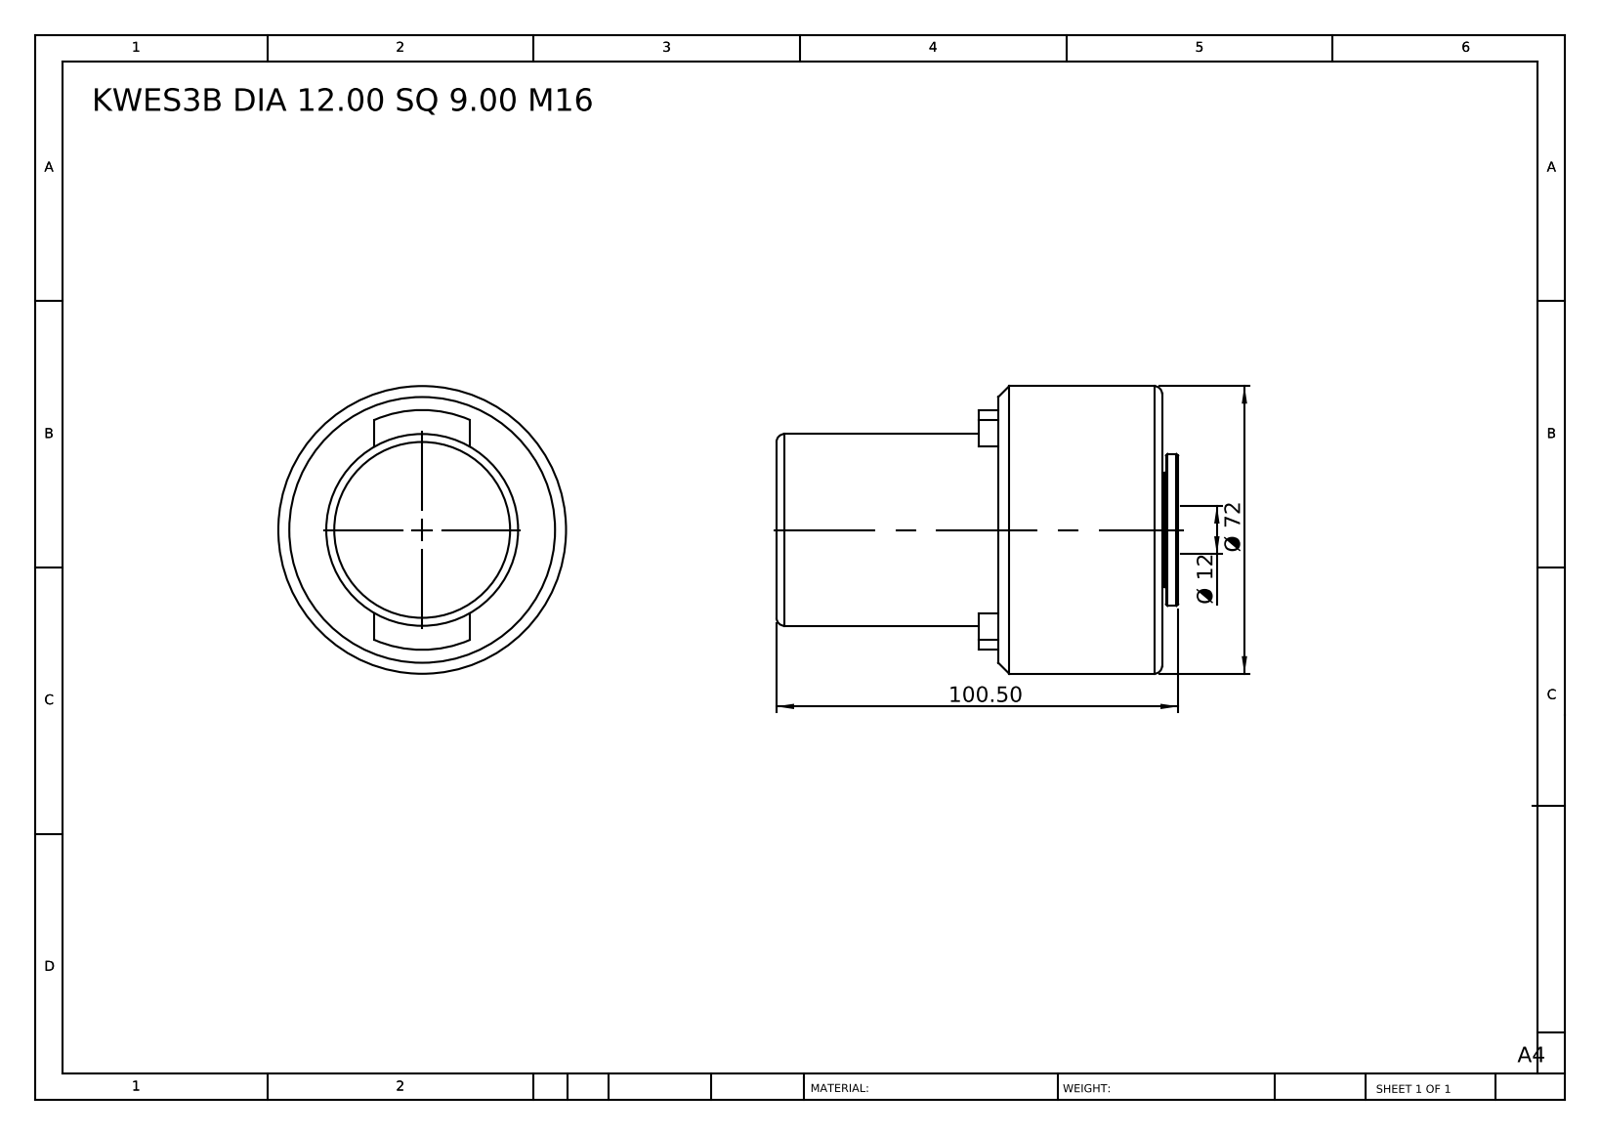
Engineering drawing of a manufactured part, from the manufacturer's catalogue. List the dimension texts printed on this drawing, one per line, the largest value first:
100.50
Ø 72
Ø 12
